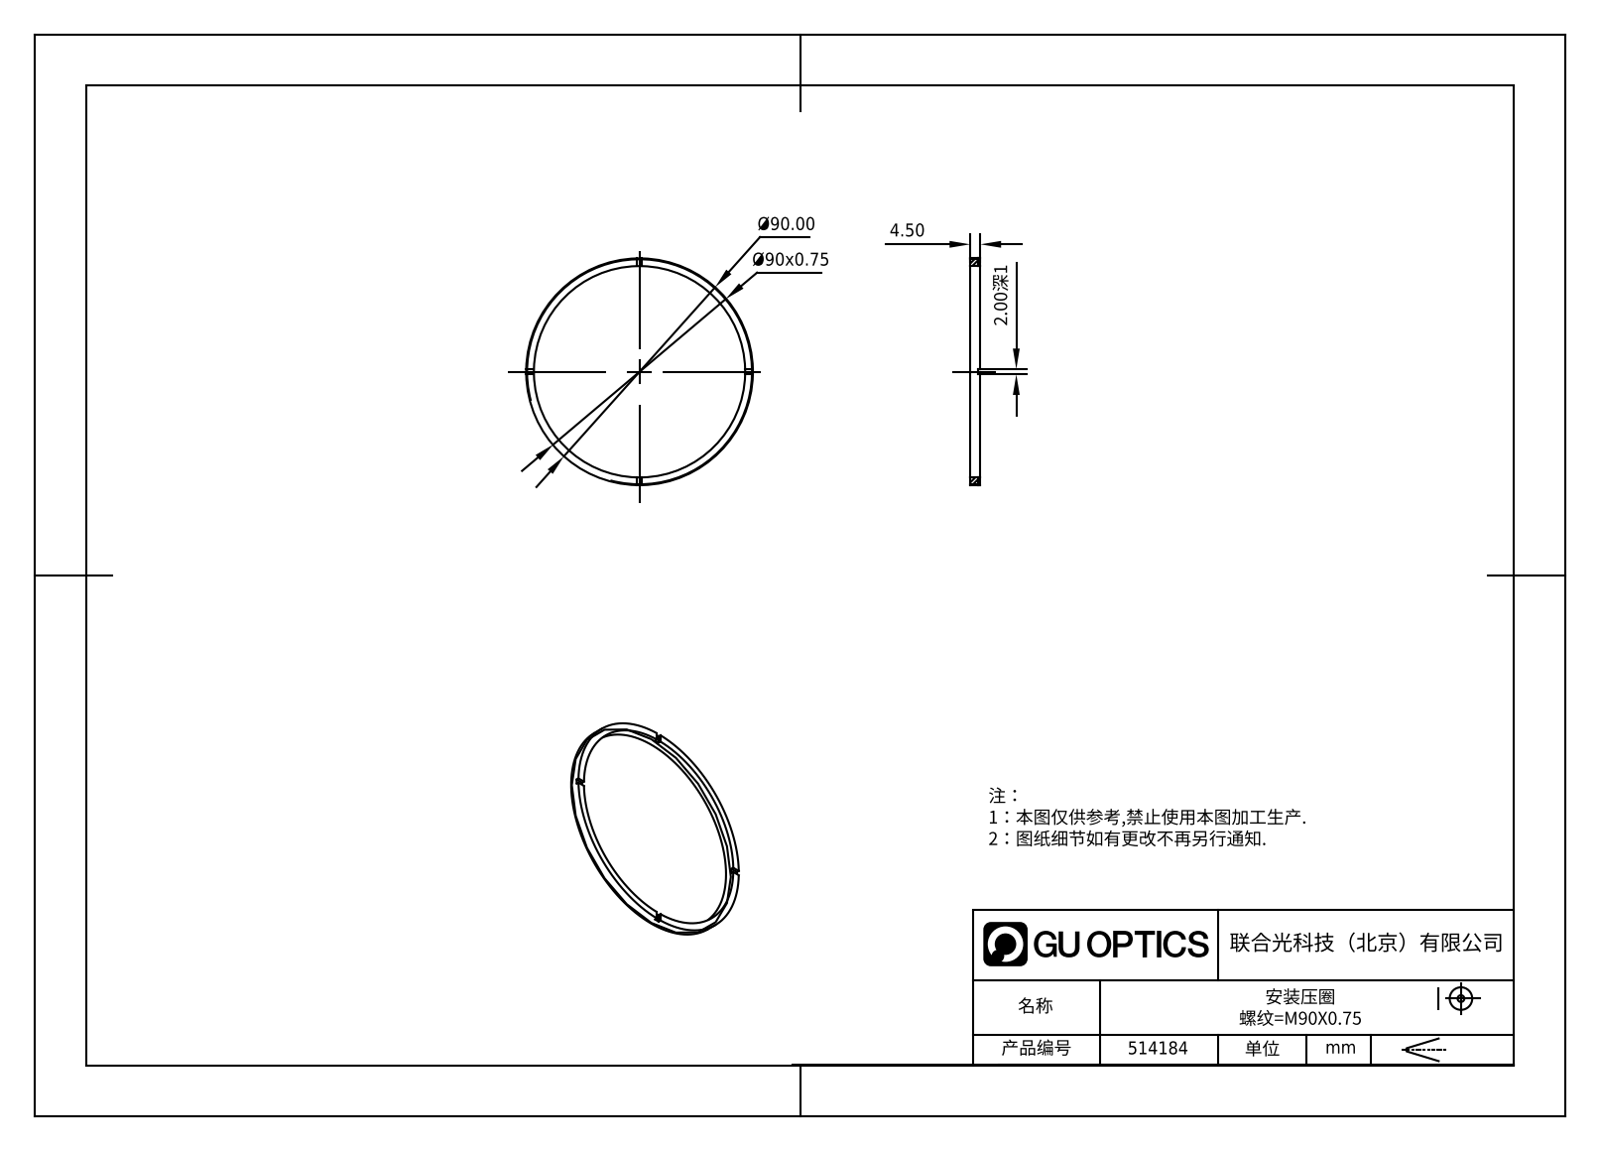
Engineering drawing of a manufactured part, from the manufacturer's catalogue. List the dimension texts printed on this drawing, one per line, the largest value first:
Ø90.00
Ø90x0.75
4.50
2.00深1
